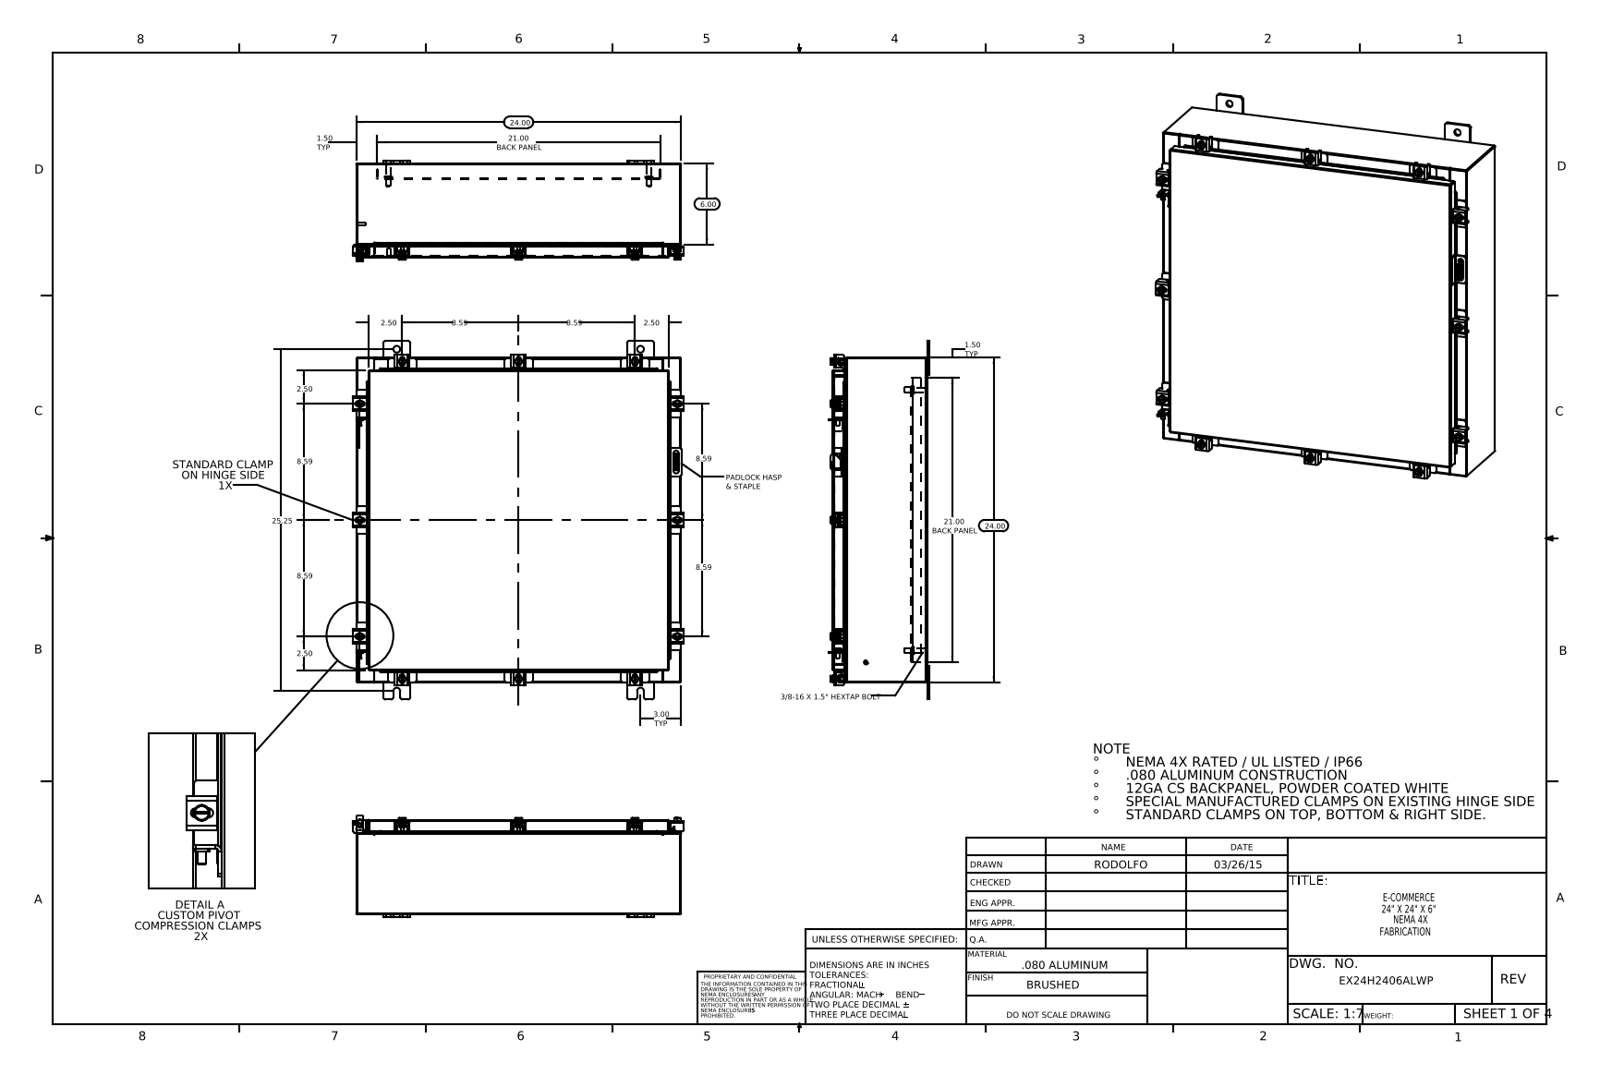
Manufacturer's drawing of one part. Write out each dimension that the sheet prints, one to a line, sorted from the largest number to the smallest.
25.25
24.00
24.00
21.00 BACK PANEL
21.00 BACK PANEL
8.59
8.59
8.59
8.59
8.59
8.59
6.00
3.00 TYP
2.50
2.50
2.50
2.50
1.50 TYP
1.50 TYP
